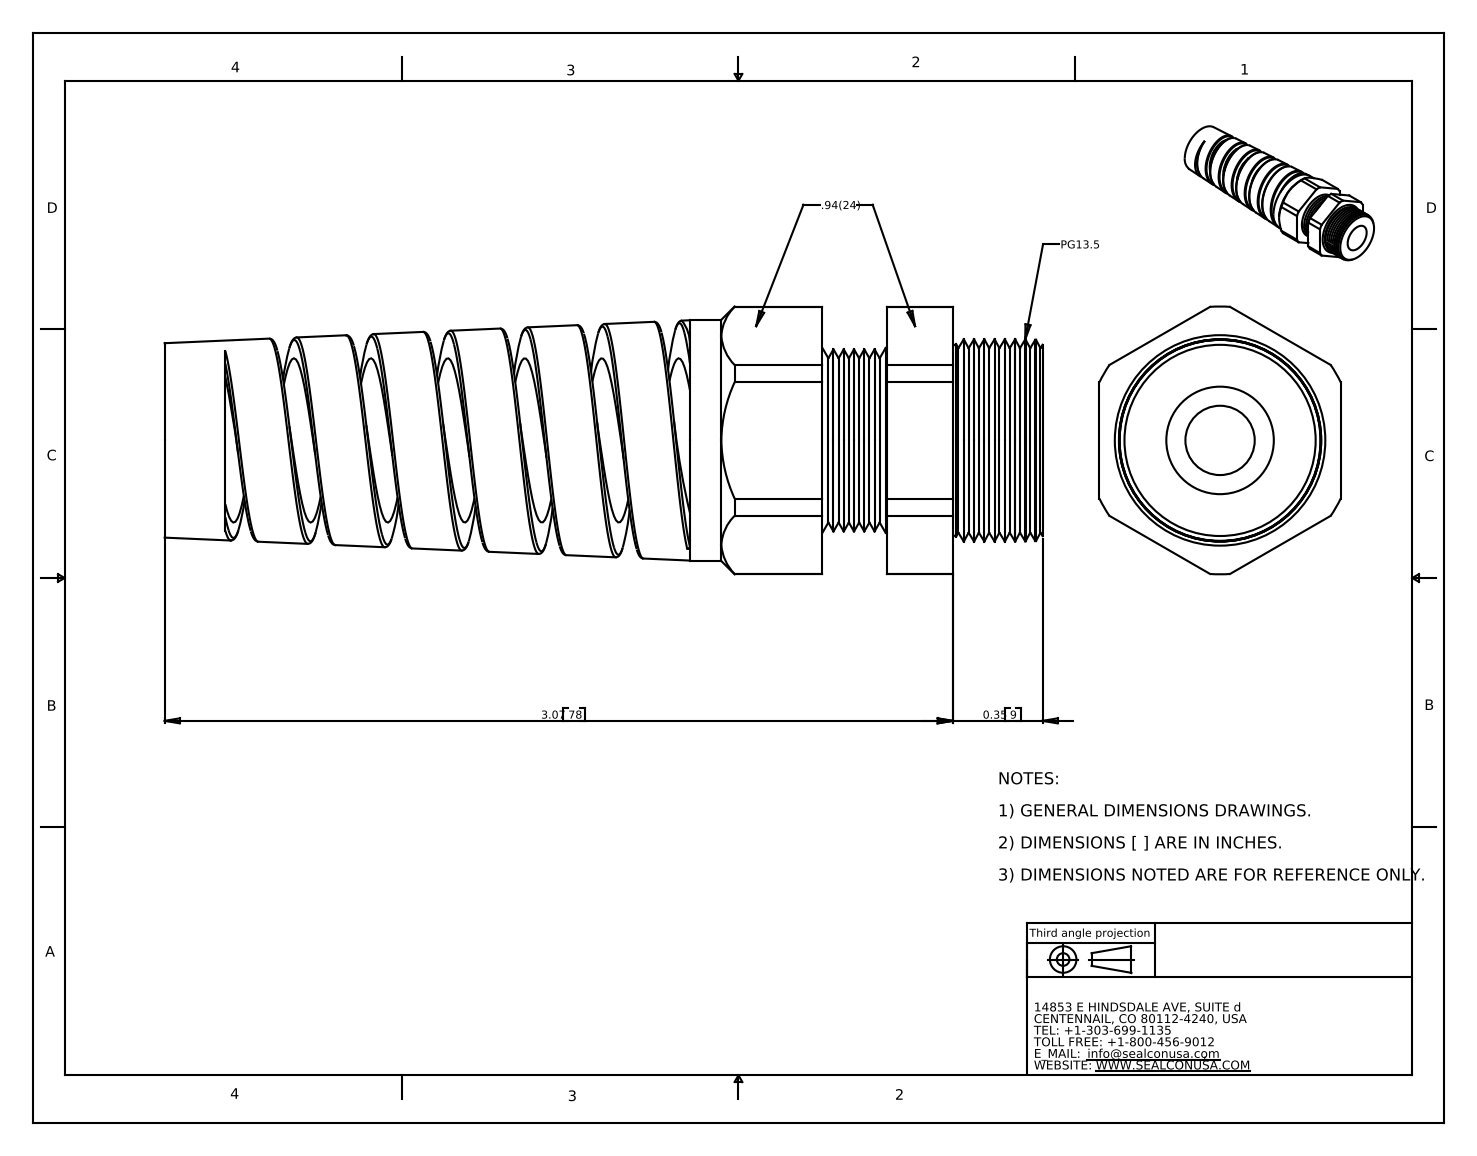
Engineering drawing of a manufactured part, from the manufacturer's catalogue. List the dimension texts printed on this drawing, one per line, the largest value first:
3.07 78
0.35 9
